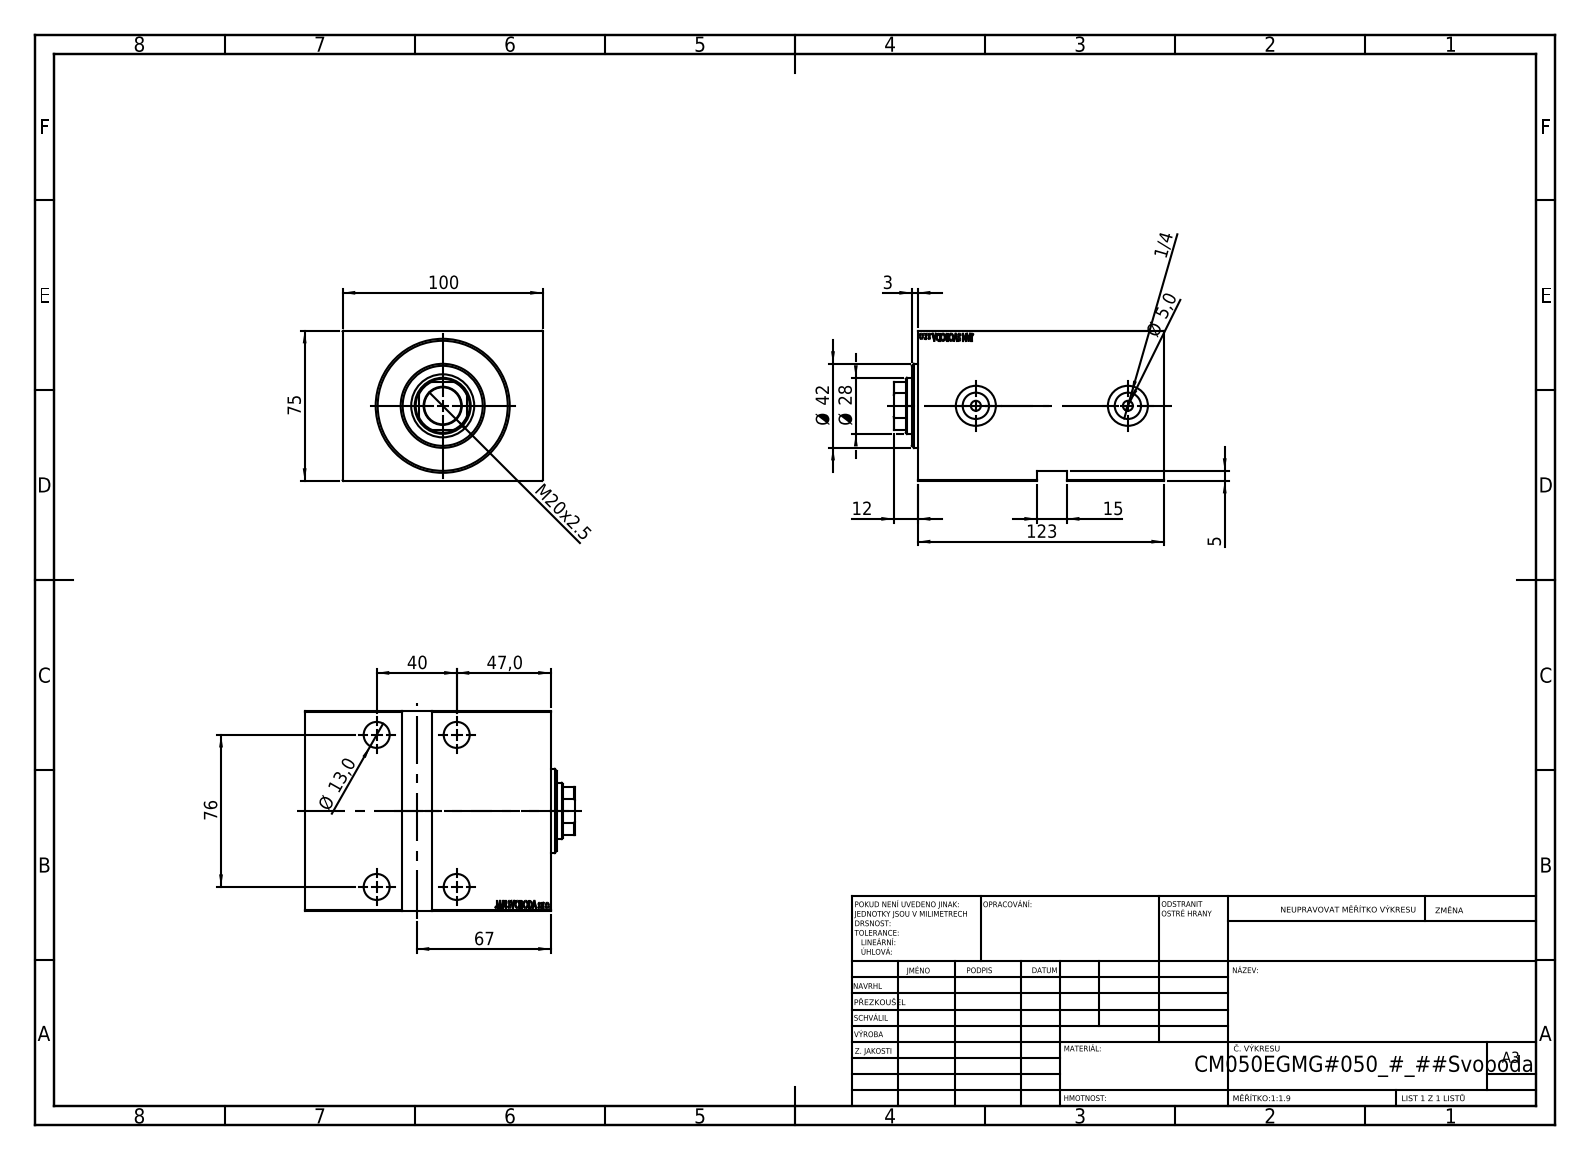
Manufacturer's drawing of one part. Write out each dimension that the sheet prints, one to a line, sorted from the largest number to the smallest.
123
100
76
75
67
47,0
Ø 42
40
Ø 28
M20x2.5
15
Ø 13,0
12
5
Ø 5,0
3
1/4
